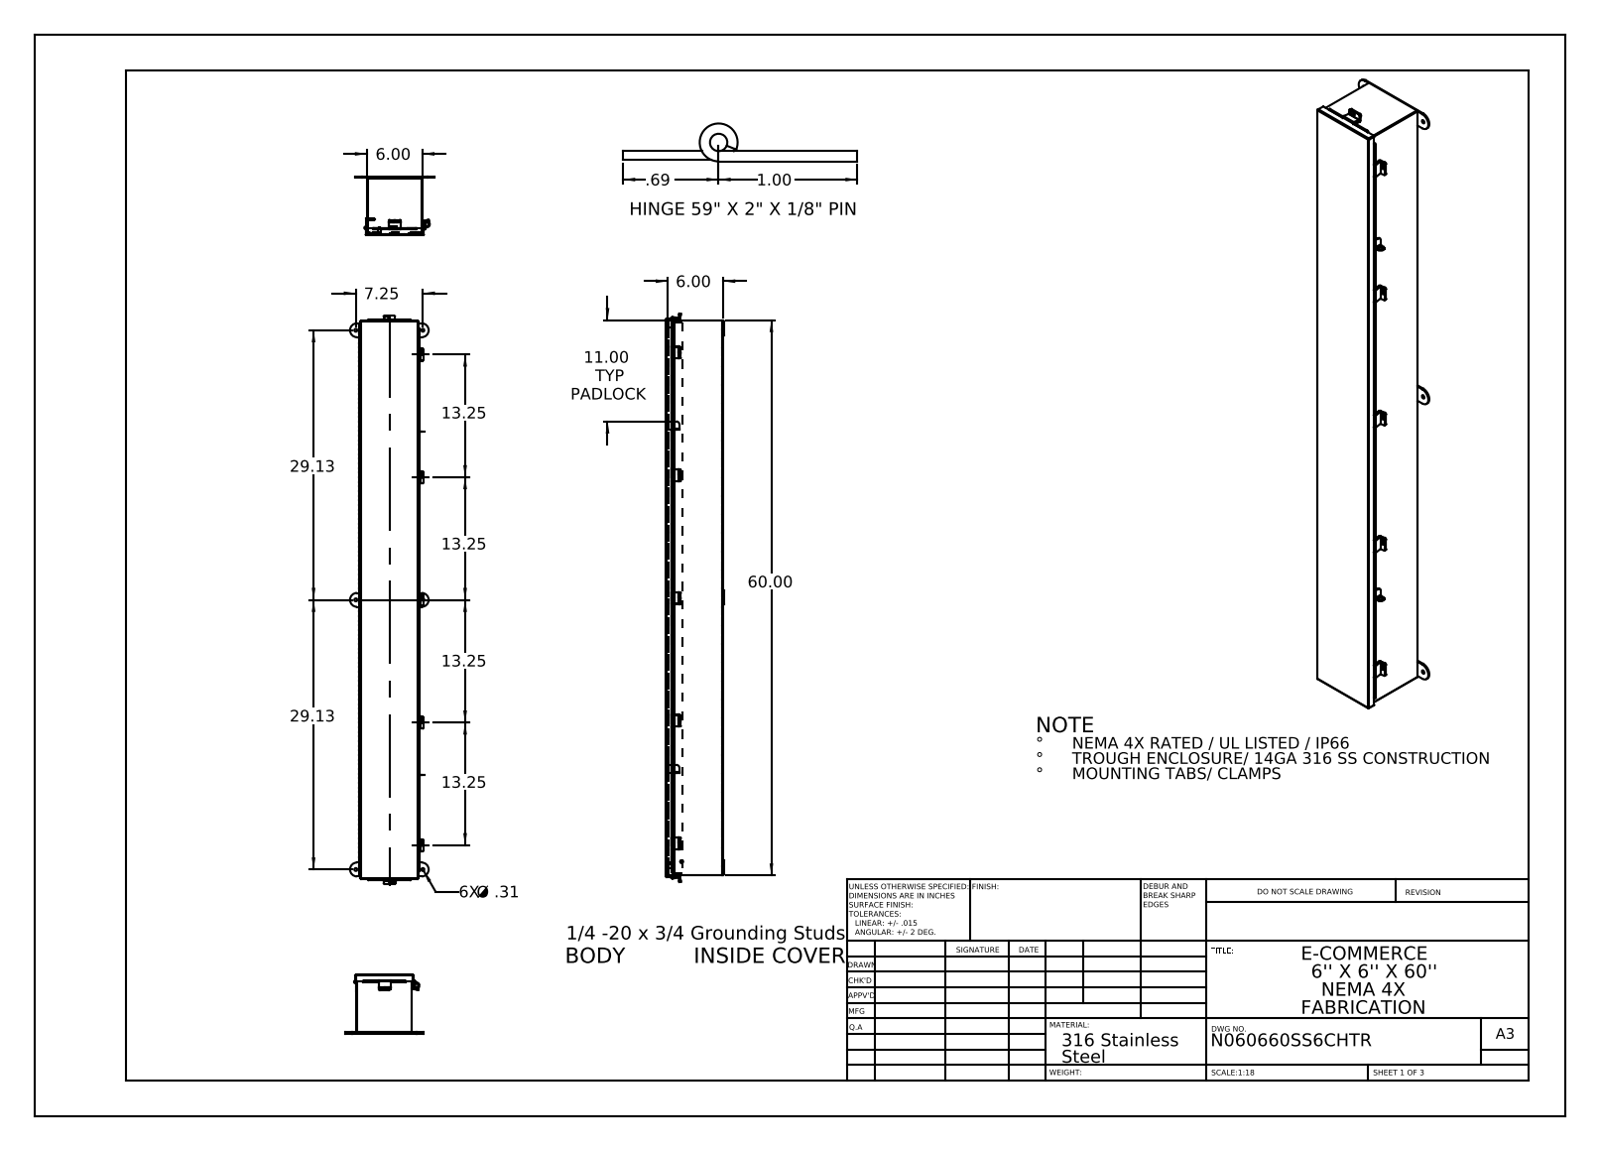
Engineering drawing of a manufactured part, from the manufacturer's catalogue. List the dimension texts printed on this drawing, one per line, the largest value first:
60.00
29.13
29.13
13.25
13.25
13.25
13.25
11.00 TYP PADLOCK
7.25
6.00
6.00
1.00
.69
6X Ø .31
